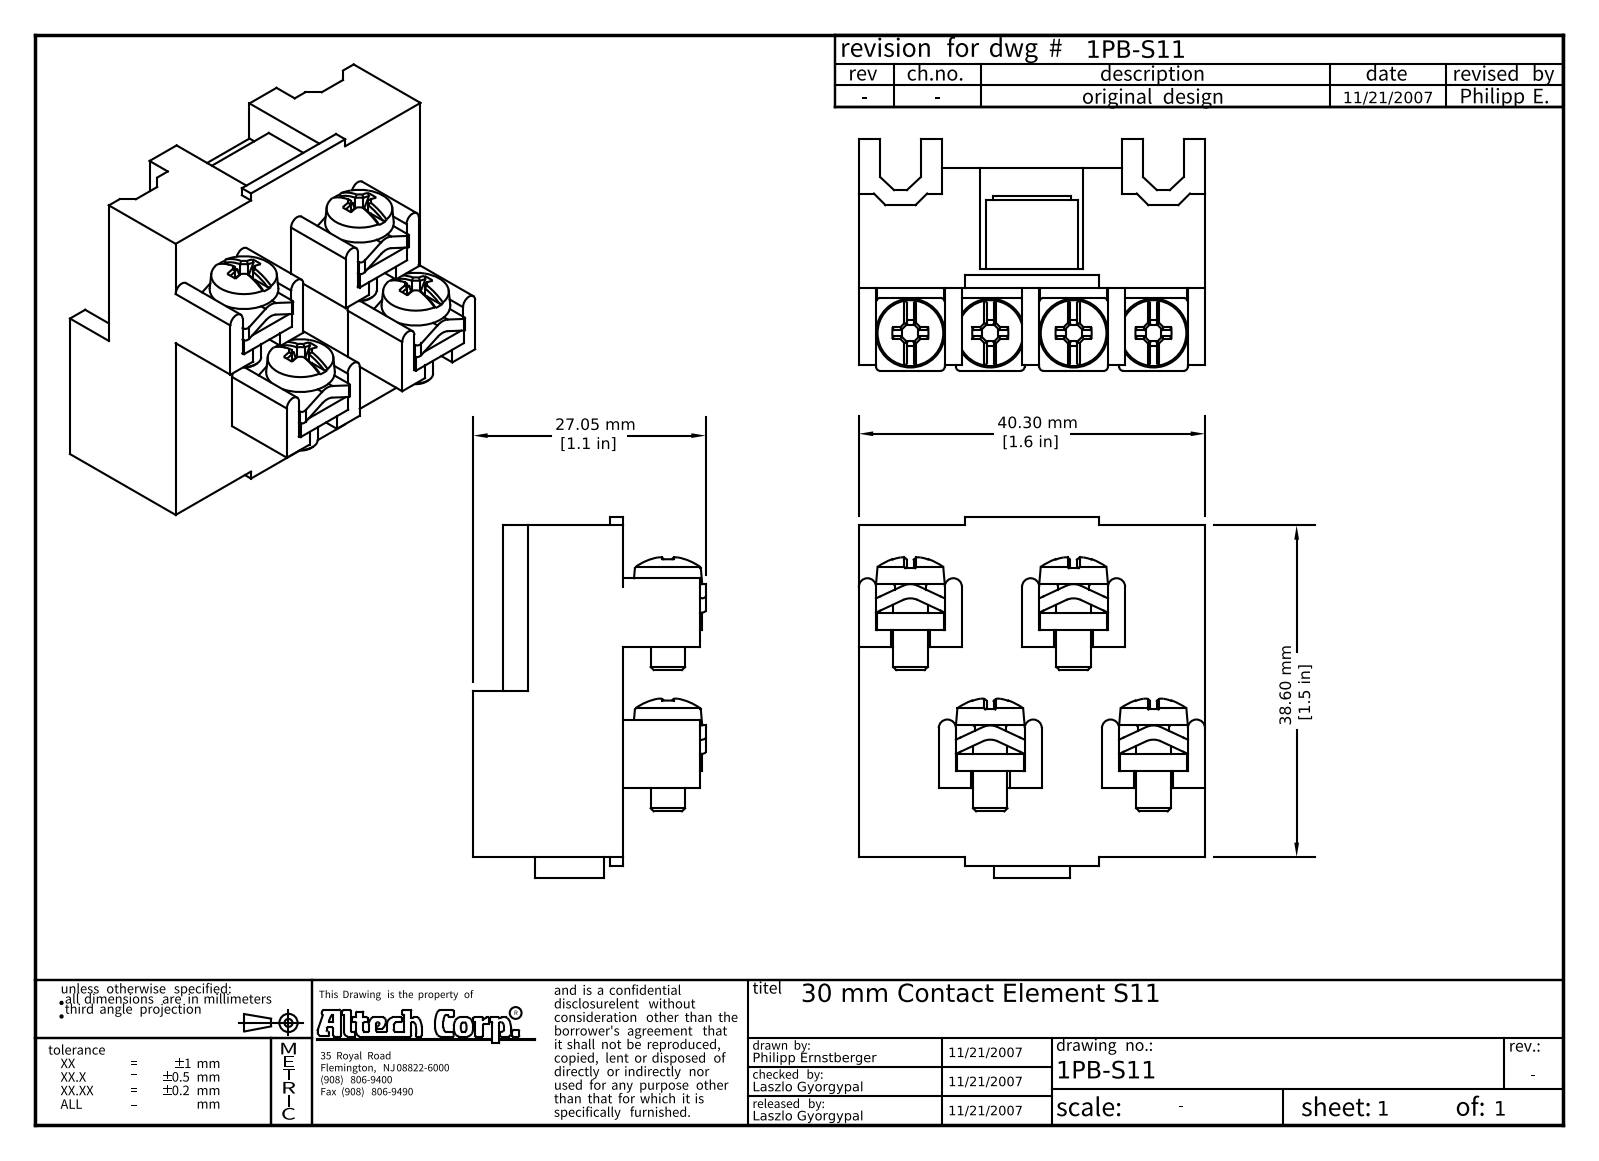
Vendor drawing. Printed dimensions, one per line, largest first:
40.30 mm [1.6 in]
38.60 mm [1.5 in]
27.05 mm [1.1 in]
